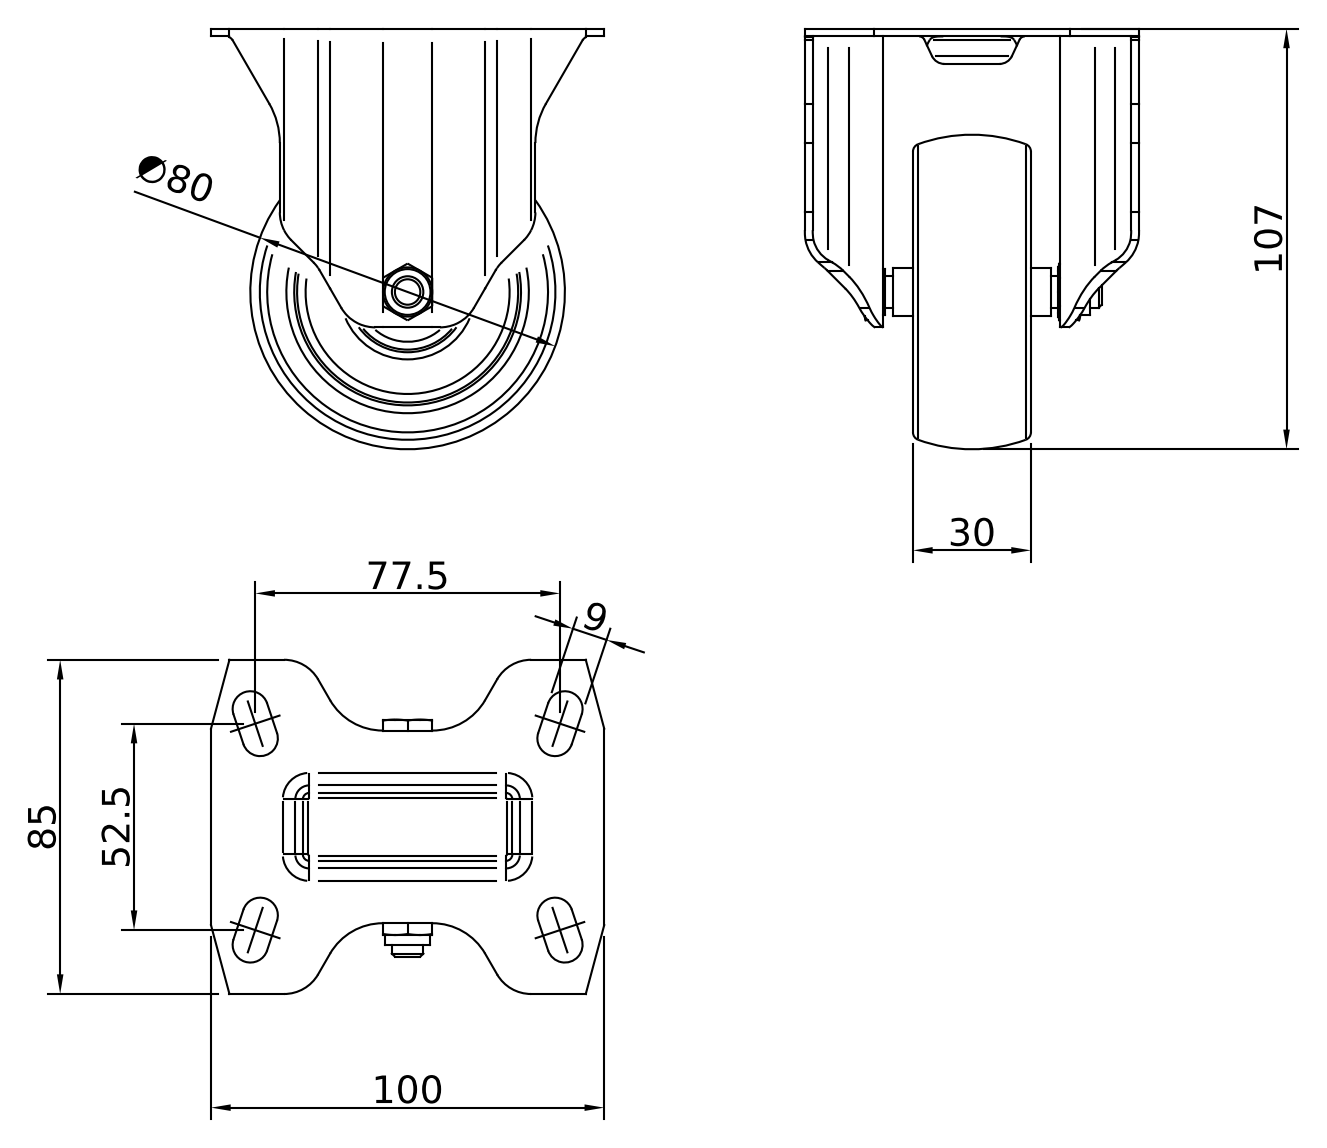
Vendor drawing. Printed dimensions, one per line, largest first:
107
100
85
∅80
77.5
52.5
30
9
